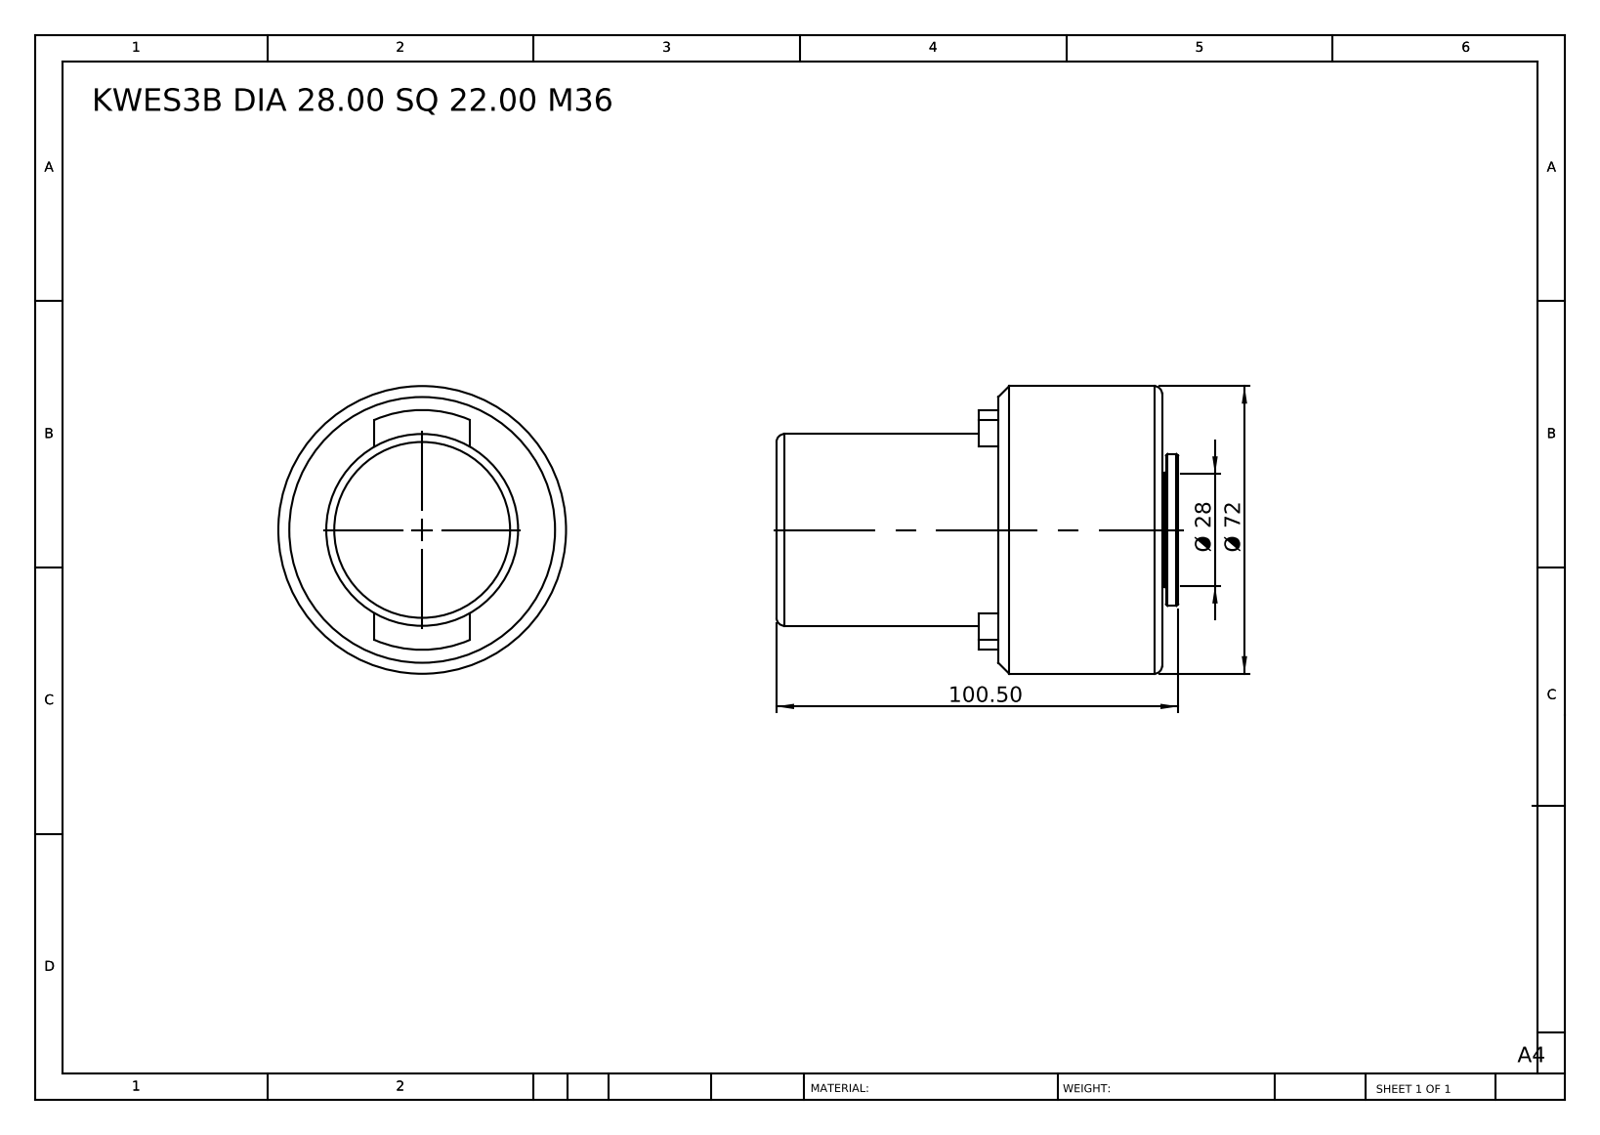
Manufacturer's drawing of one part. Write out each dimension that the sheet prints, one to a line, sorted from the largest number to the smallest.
100.50
Ø 72
Ø 28
